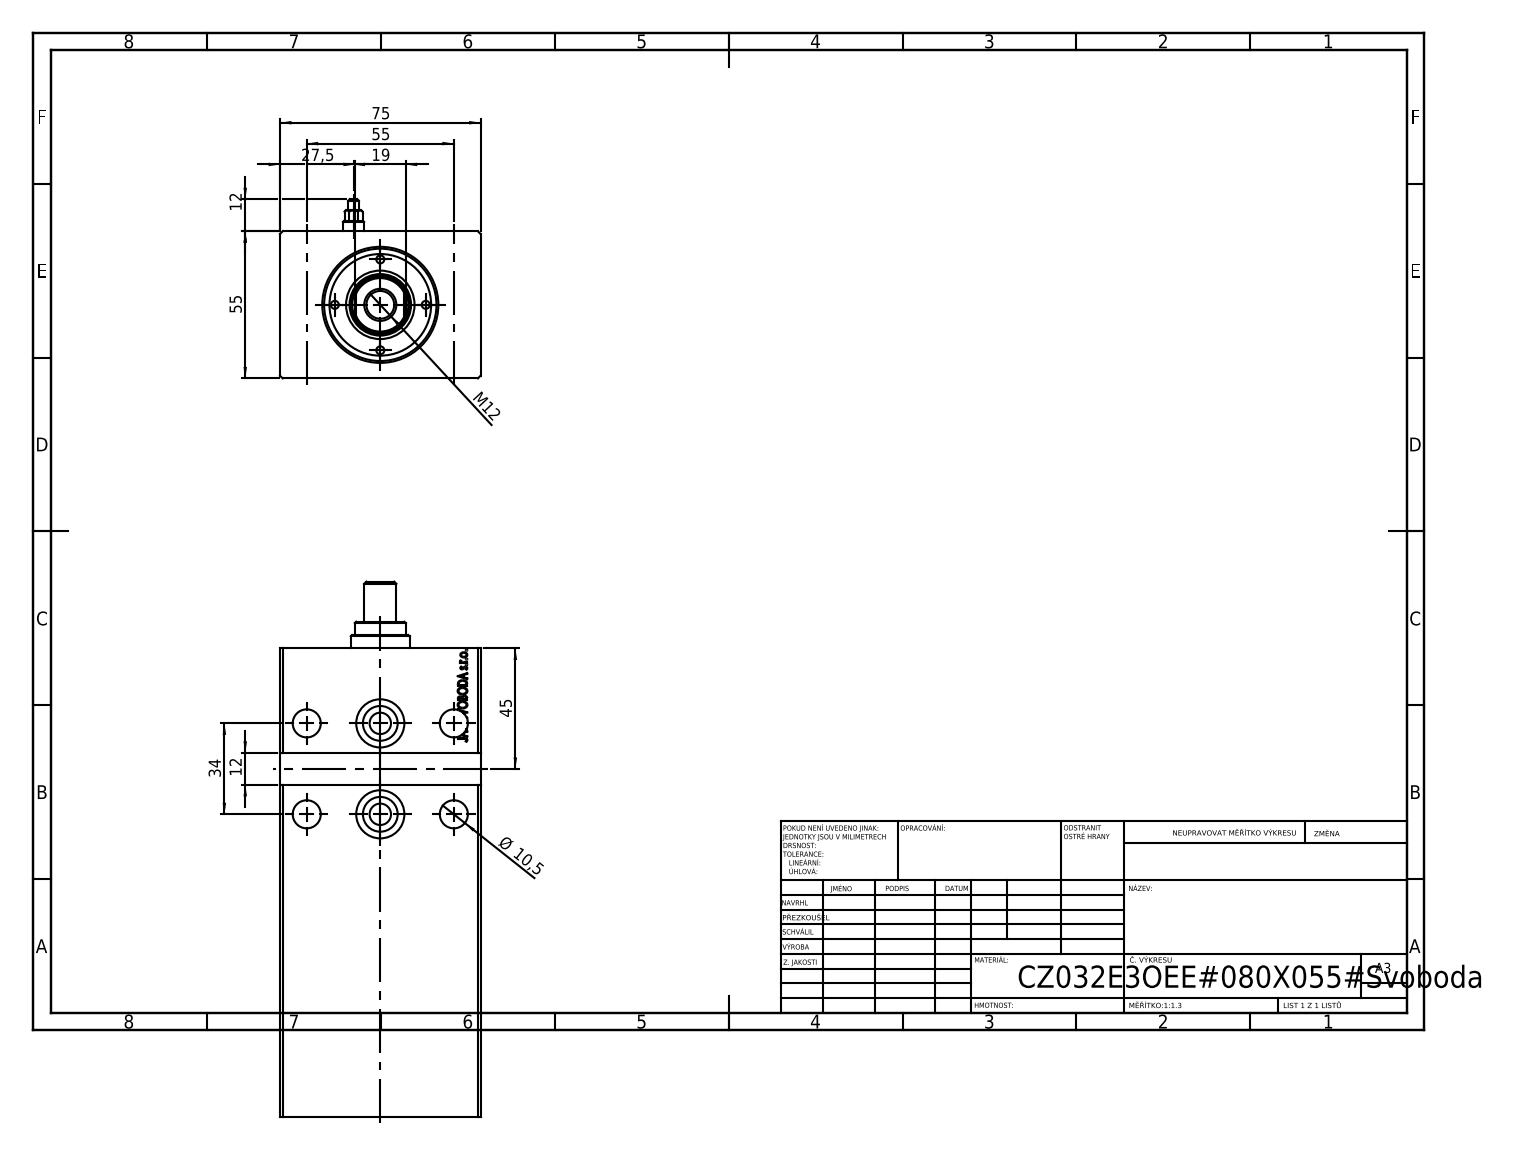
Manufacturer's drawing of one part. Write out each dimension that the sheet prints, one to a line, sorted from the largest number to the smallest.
75
55
55
45
34
27,5
19
M12
12
12
Ø 10,5
